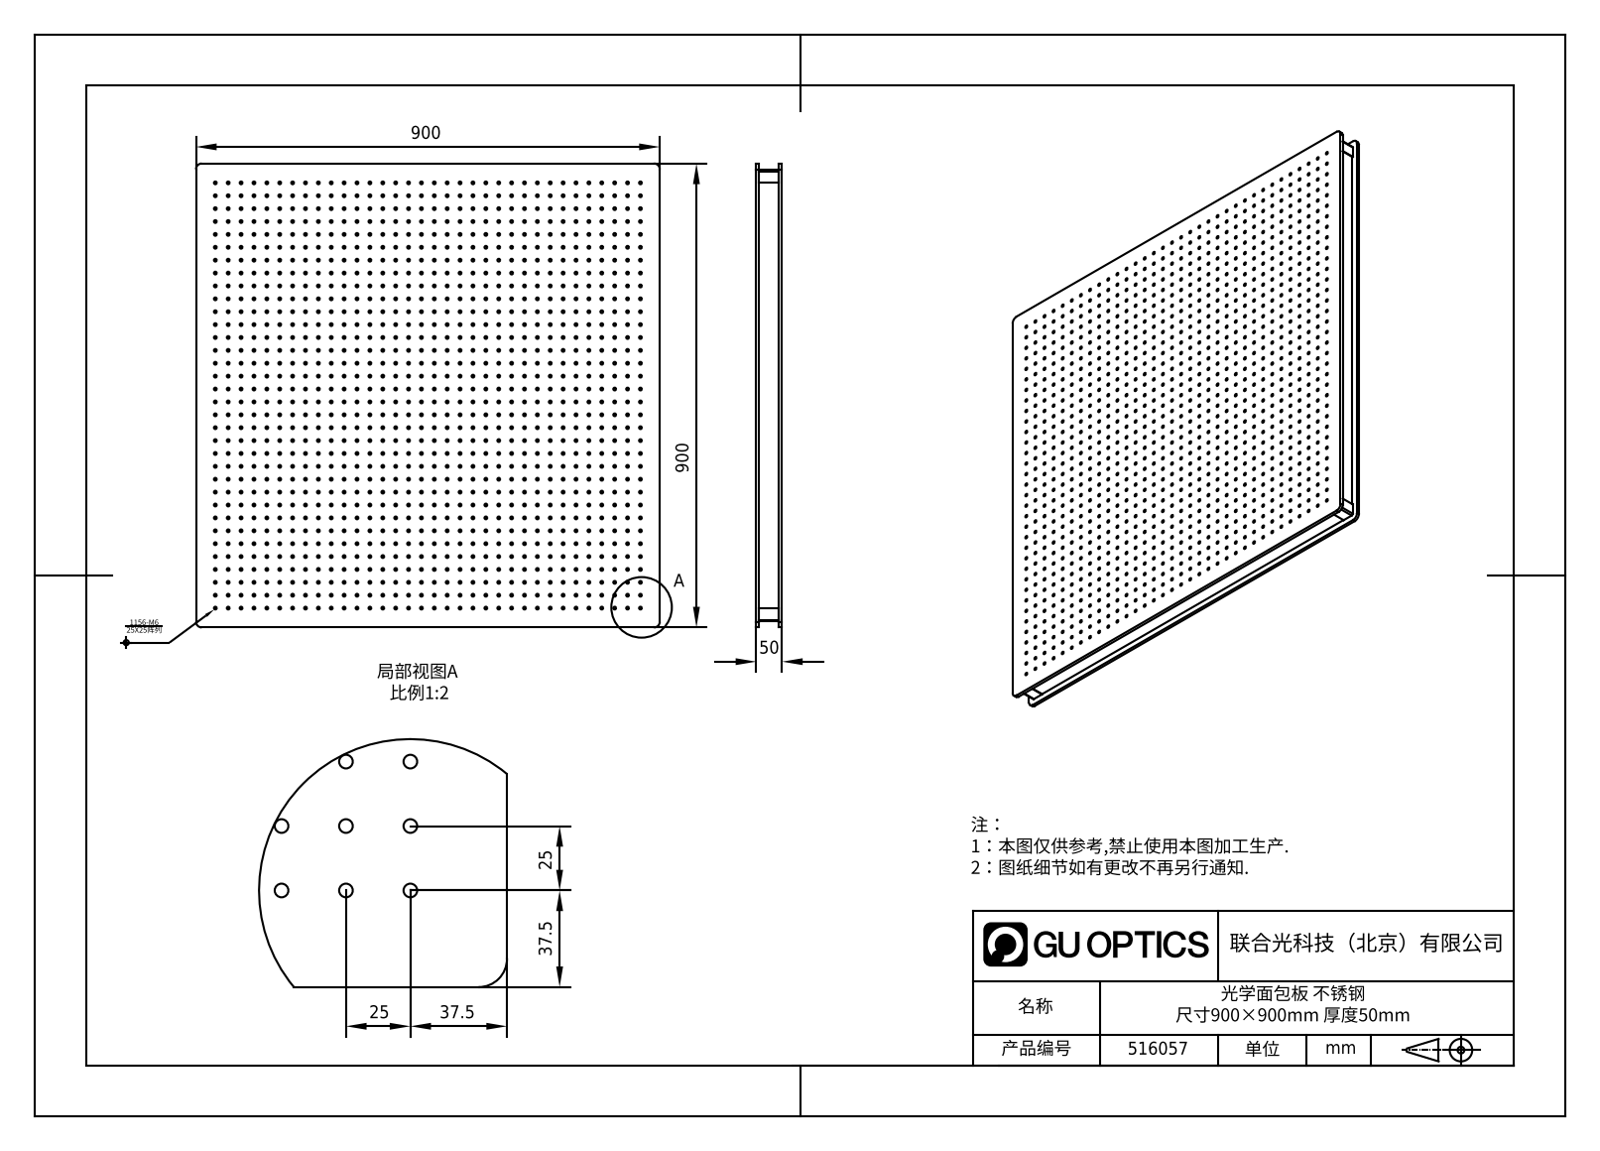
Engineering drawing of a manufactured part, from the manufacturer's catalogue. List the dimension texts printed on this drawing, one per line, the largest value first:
900
900
50
37.5
37.5
25
25
